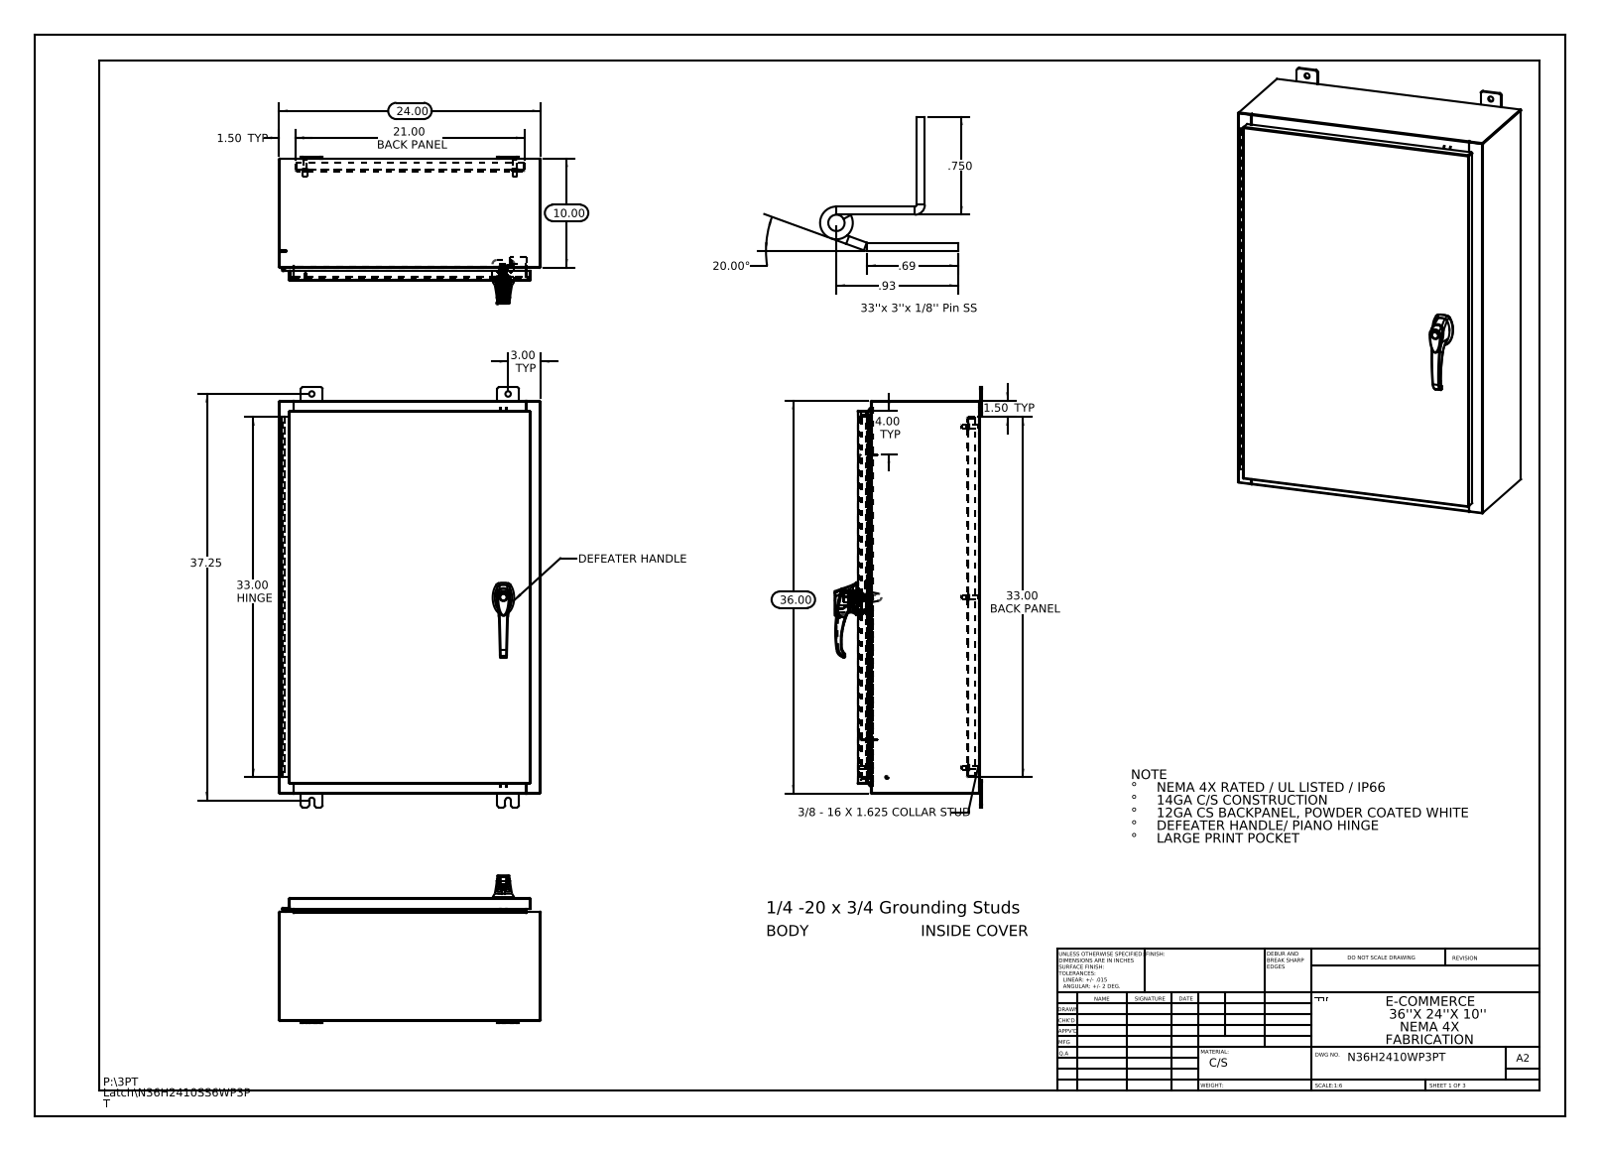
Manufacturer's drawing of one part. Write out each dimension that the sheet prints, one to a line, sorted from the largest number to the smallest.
37.25
36.00
33.00 HINGE
33.00 BACK PANEL
24.00
21.00 BACK PANEL
20.00°
10.00
4.00 TYP
3.00 TYP
1.50 TYP
1.50 TYP
.93
.750
.69
